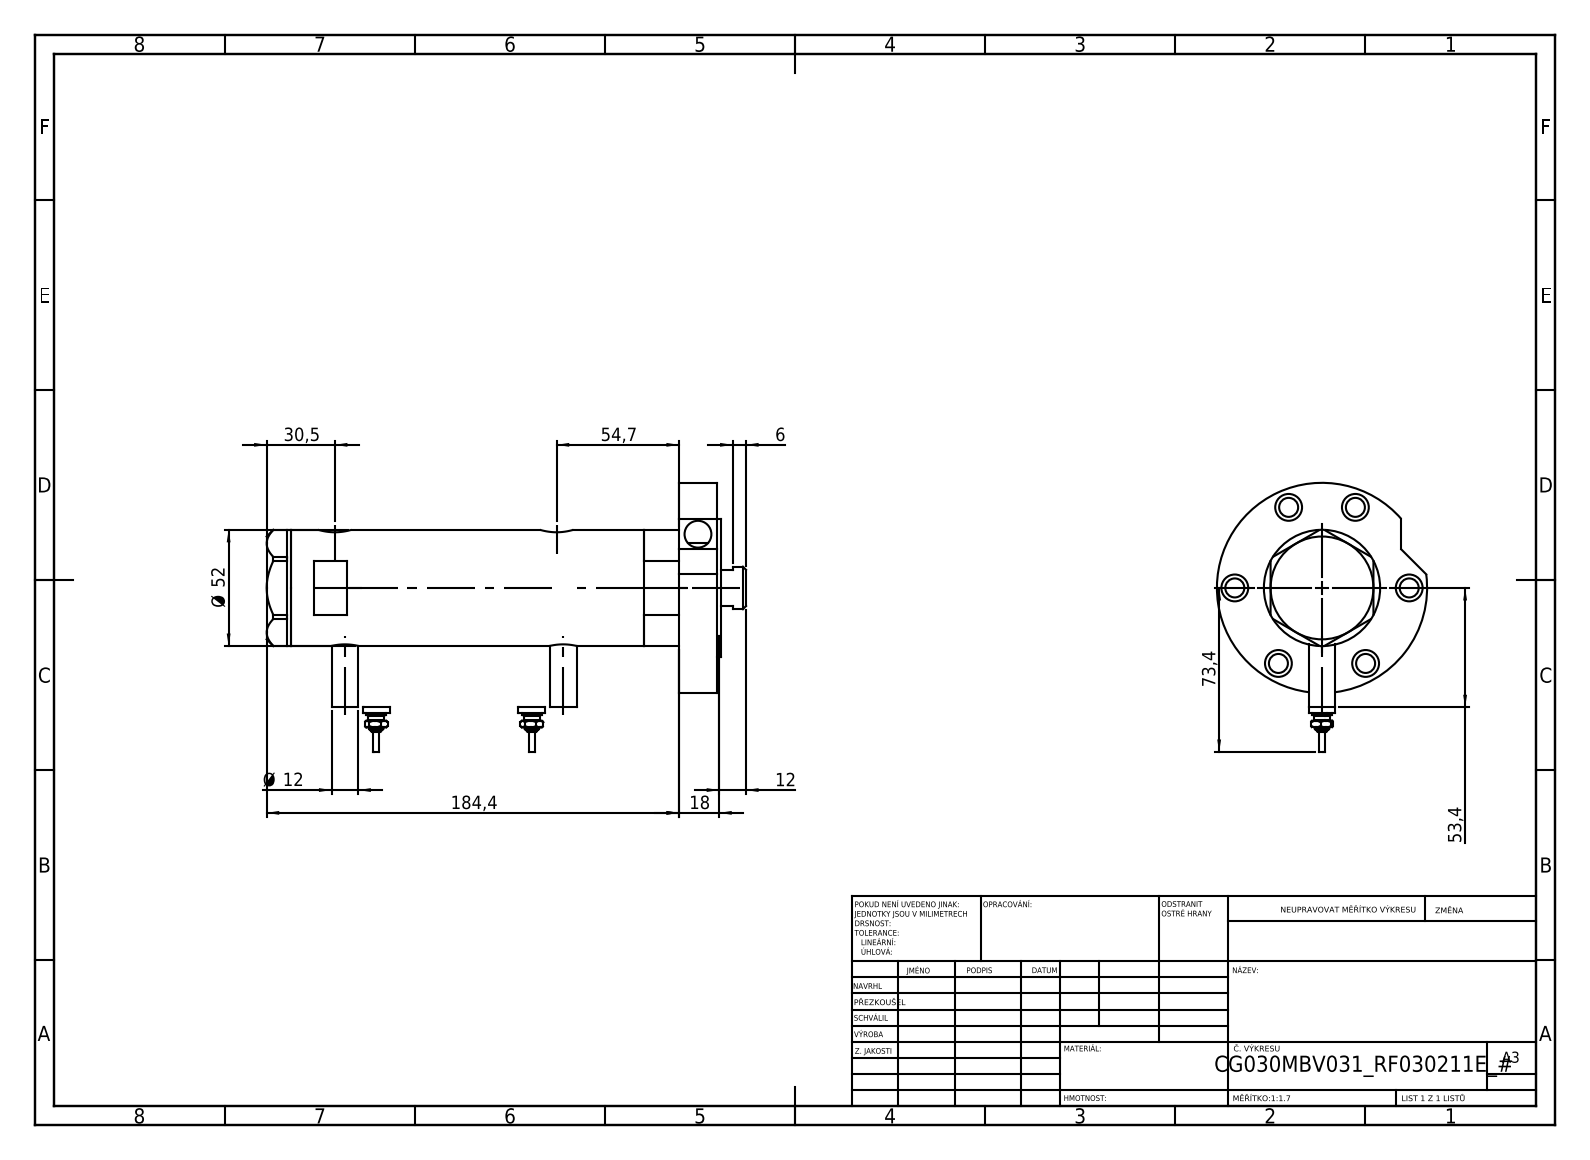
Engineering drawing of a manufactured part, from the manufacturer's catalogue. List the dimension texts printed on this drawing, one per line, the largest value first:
184,4
73,4
54,7
53,4
Ø 52
30,5
18
12
Ø 12
6
